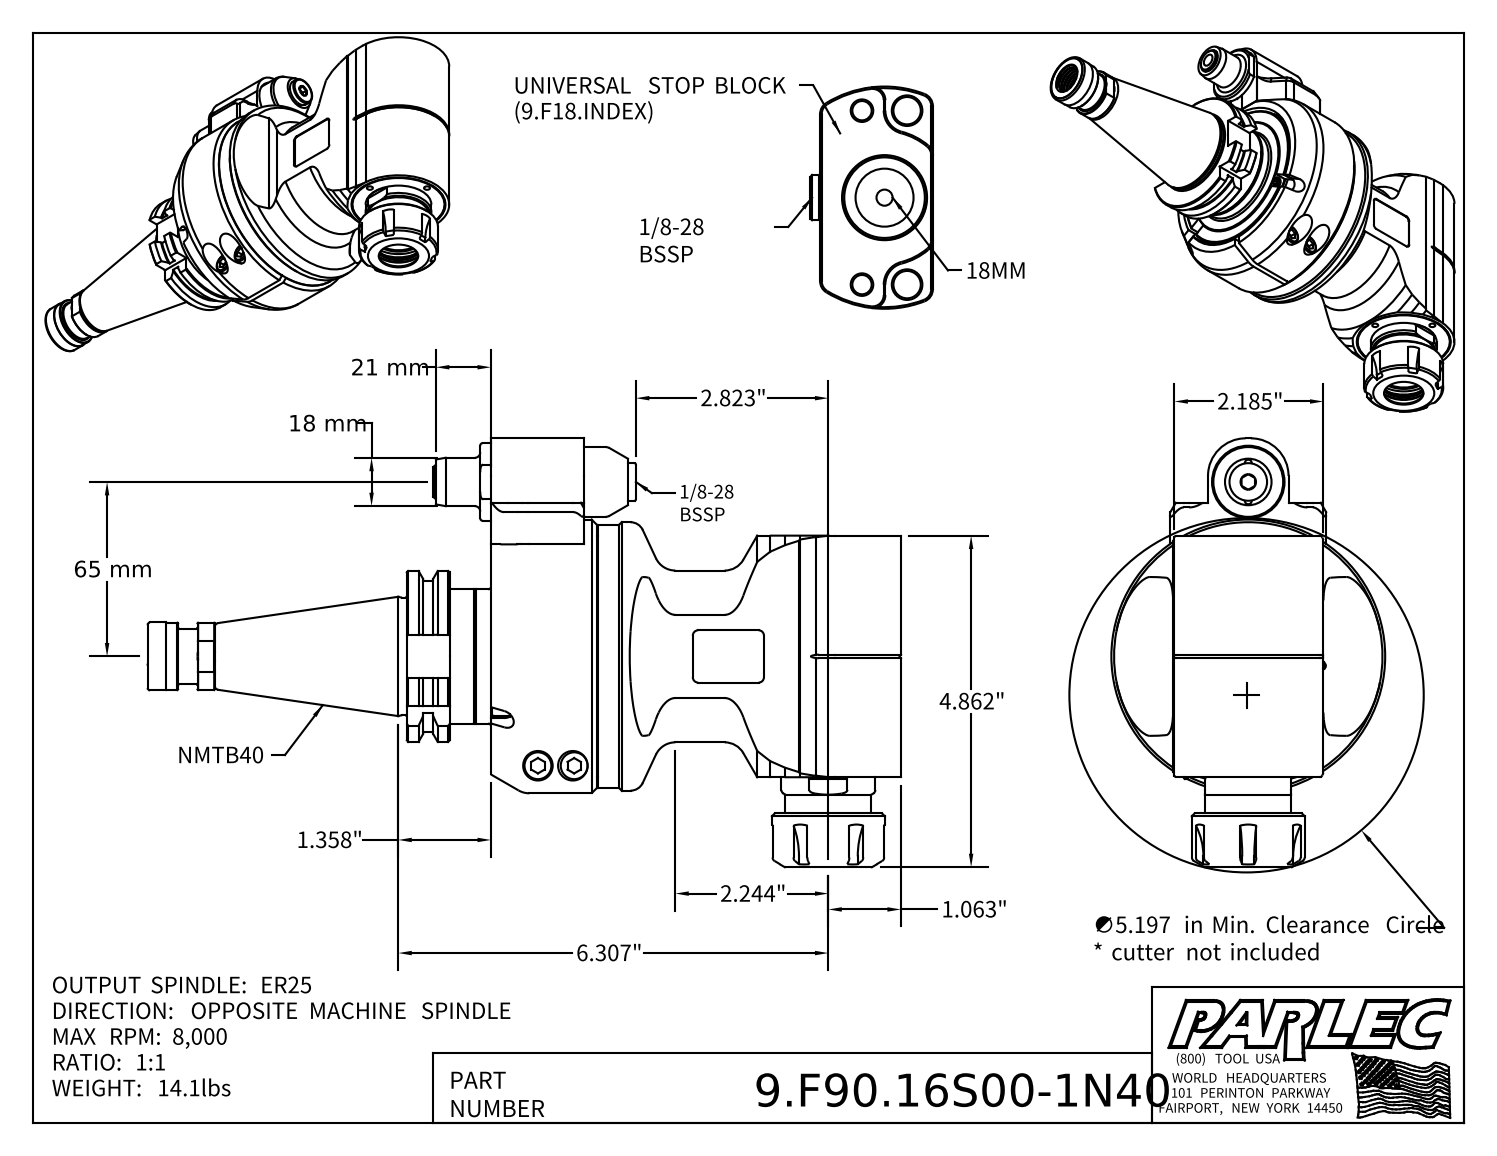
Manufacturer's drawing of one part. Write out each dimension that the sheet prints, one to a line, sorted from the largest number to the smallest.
65 mm
21 mm
18 mm
6.307"
∅5.197 in Min. Clearance Circle * cutter not included
4.862"
2.823"
2.244"
2.185"
1.358"
1.063"
